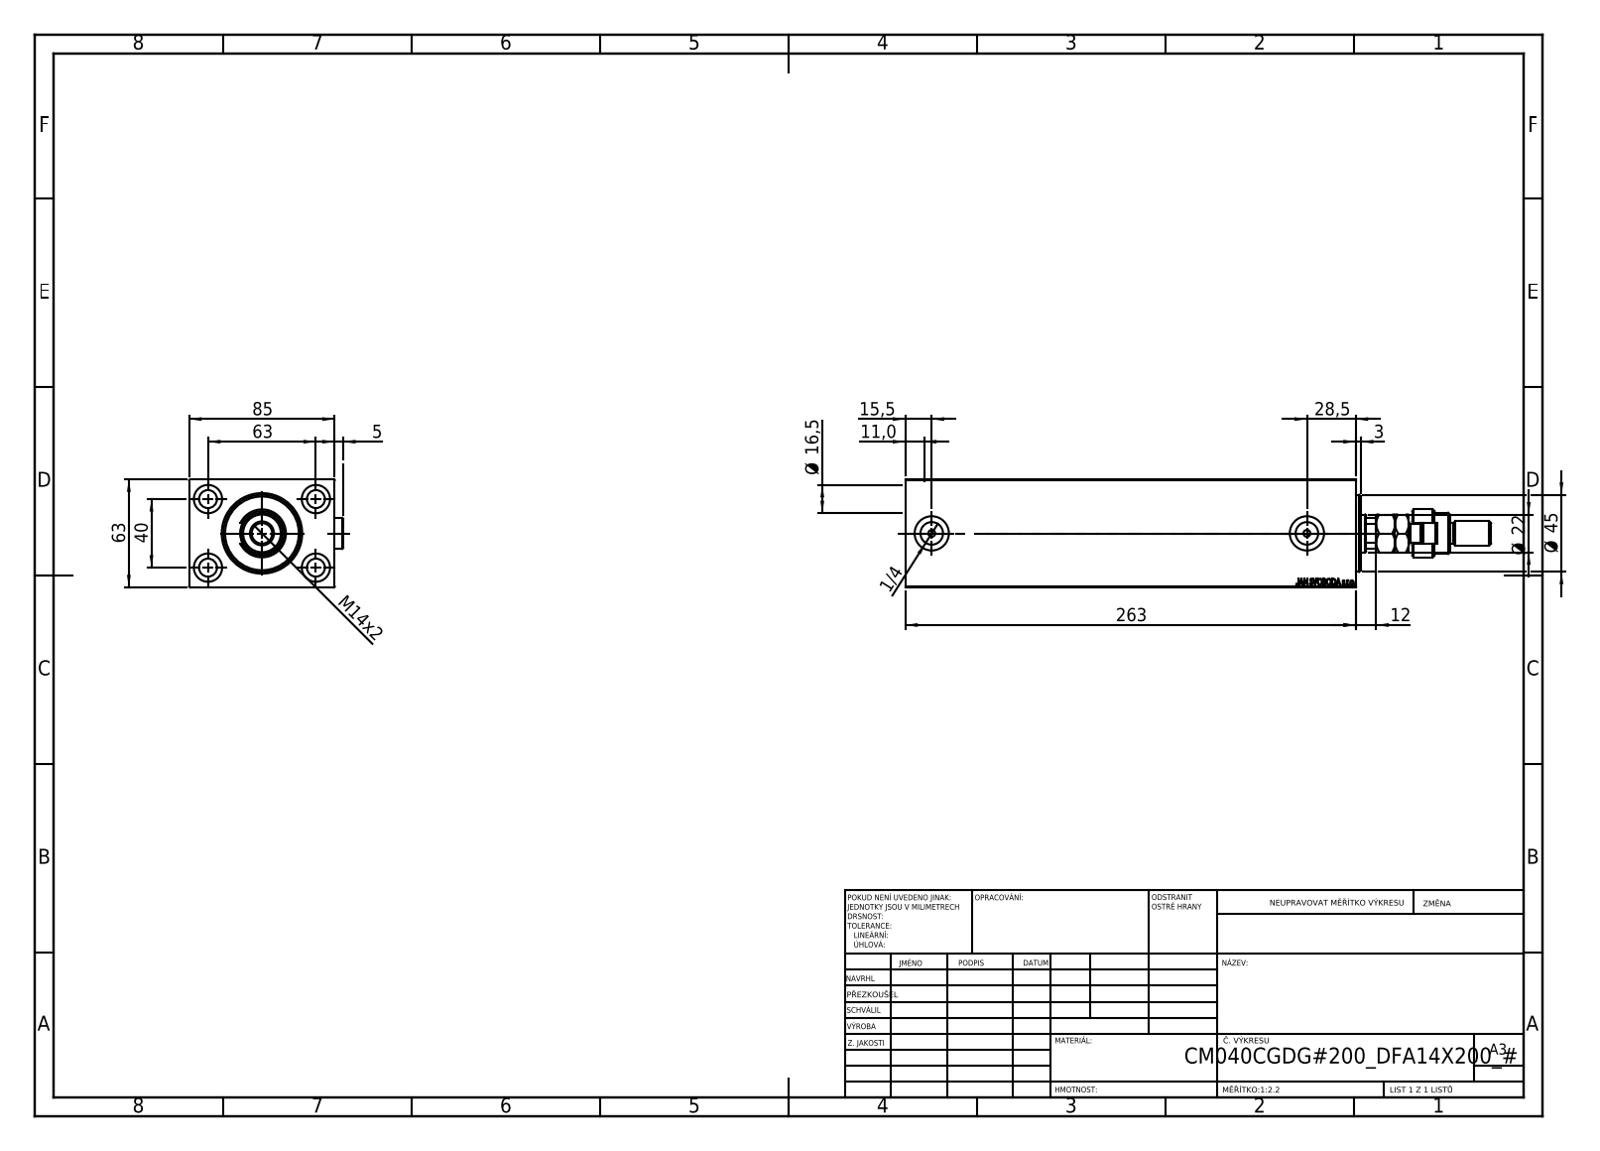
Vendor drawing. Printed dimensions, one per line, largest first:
263
85
63
63
Ø 45
40
28,5
Ø 22
Ø 16,5
15,5
M14x2
12
11,0
5
3
1/4
